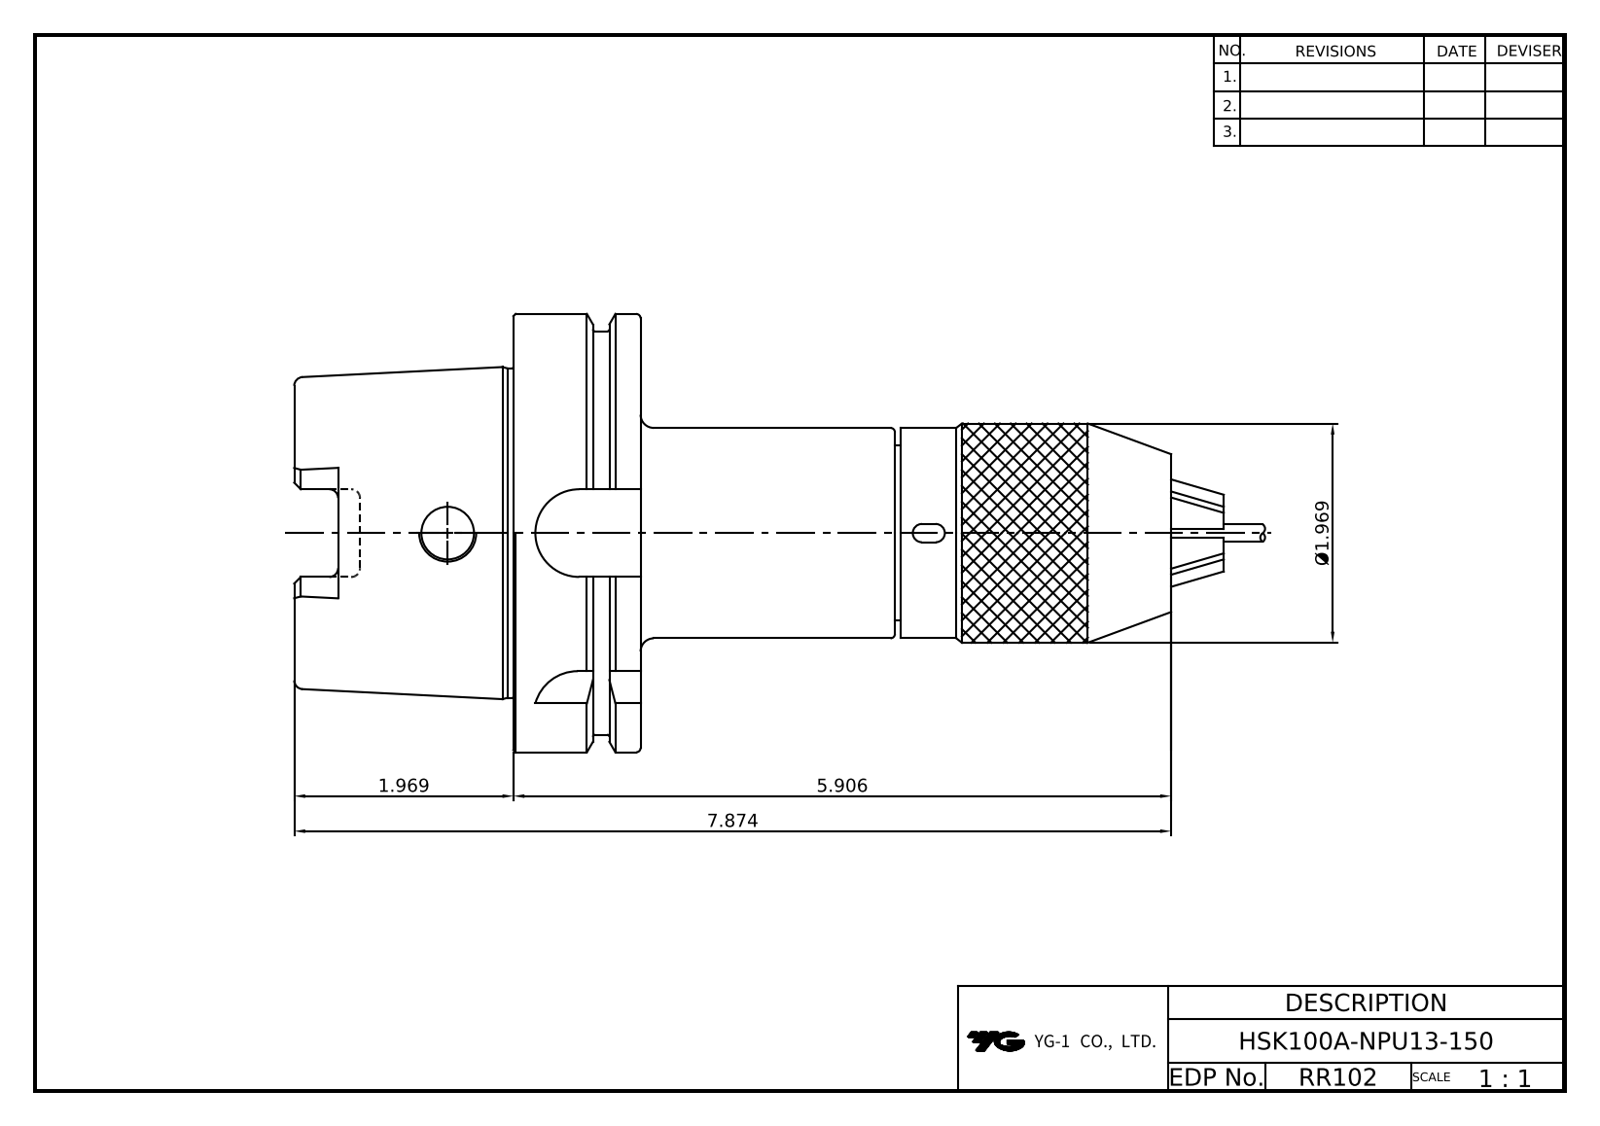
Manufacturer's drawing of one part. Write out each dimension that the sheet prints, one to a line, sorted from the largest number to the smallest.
7.874
5.906
1.969
Ø1.969
